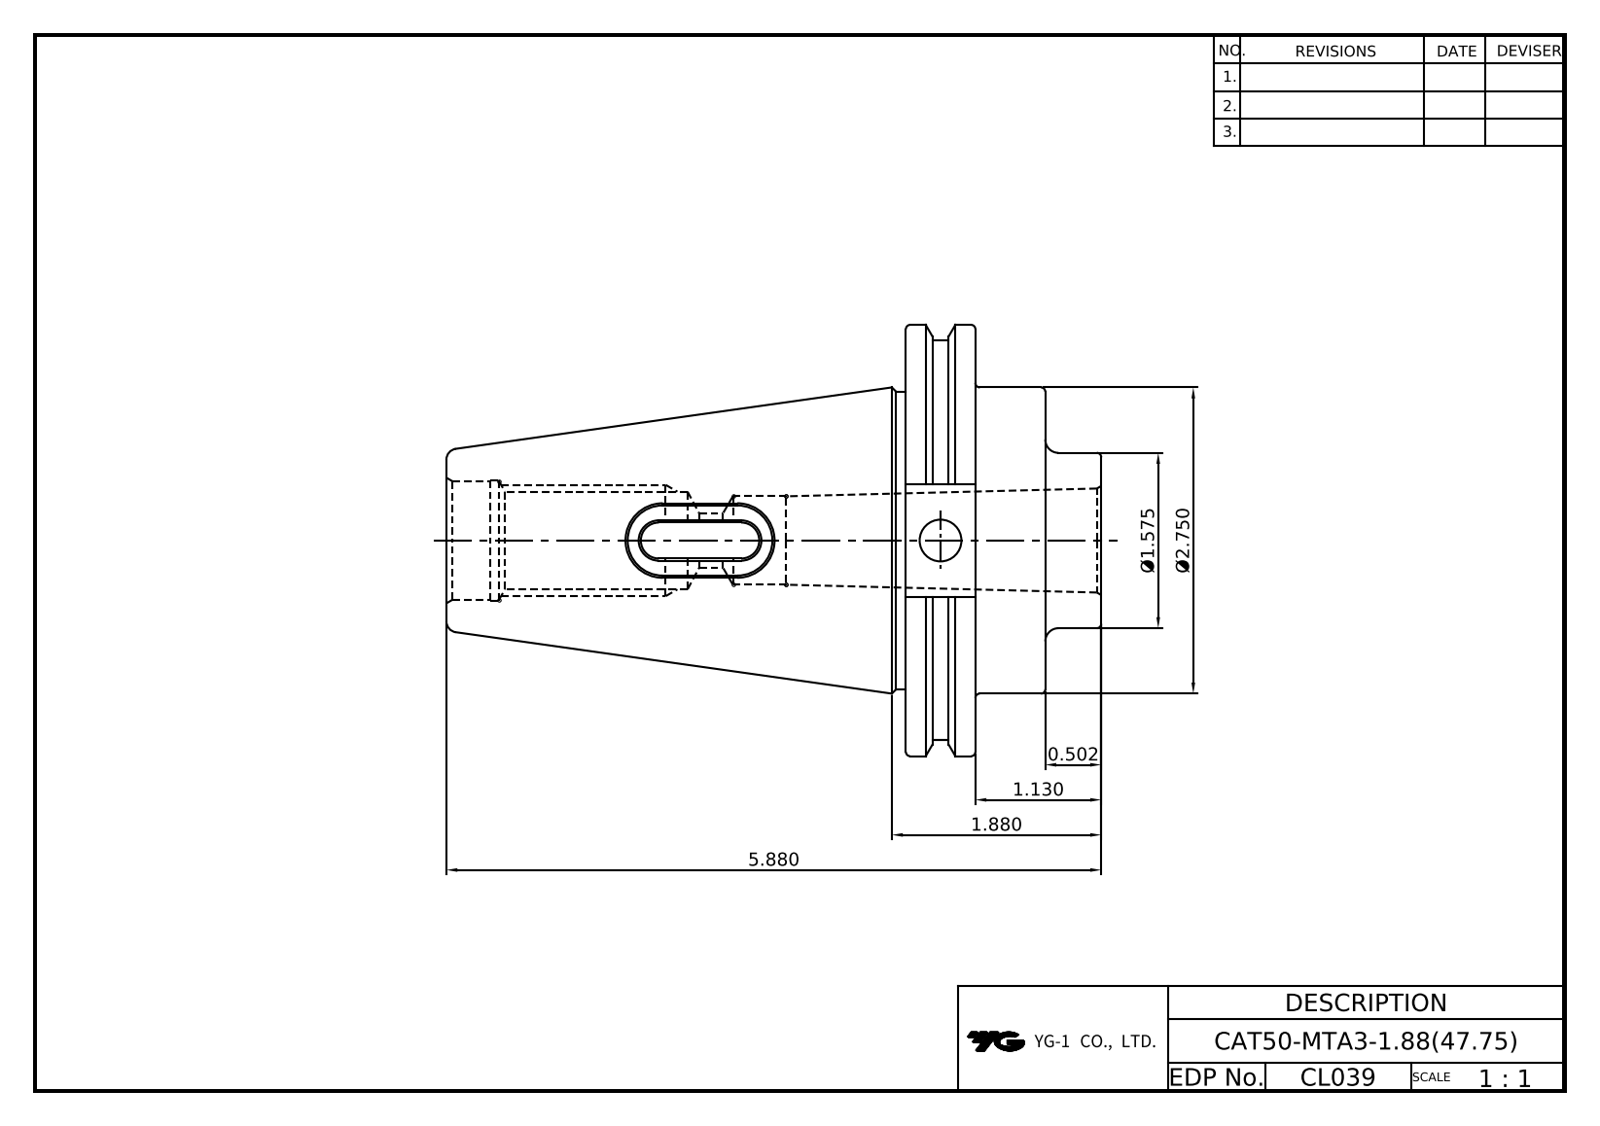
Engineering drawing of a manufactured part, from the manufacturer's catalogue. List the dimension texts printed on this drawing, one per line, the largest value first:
5.880
Ø2.750
1.880
Ø1.575
1.130
0.502
